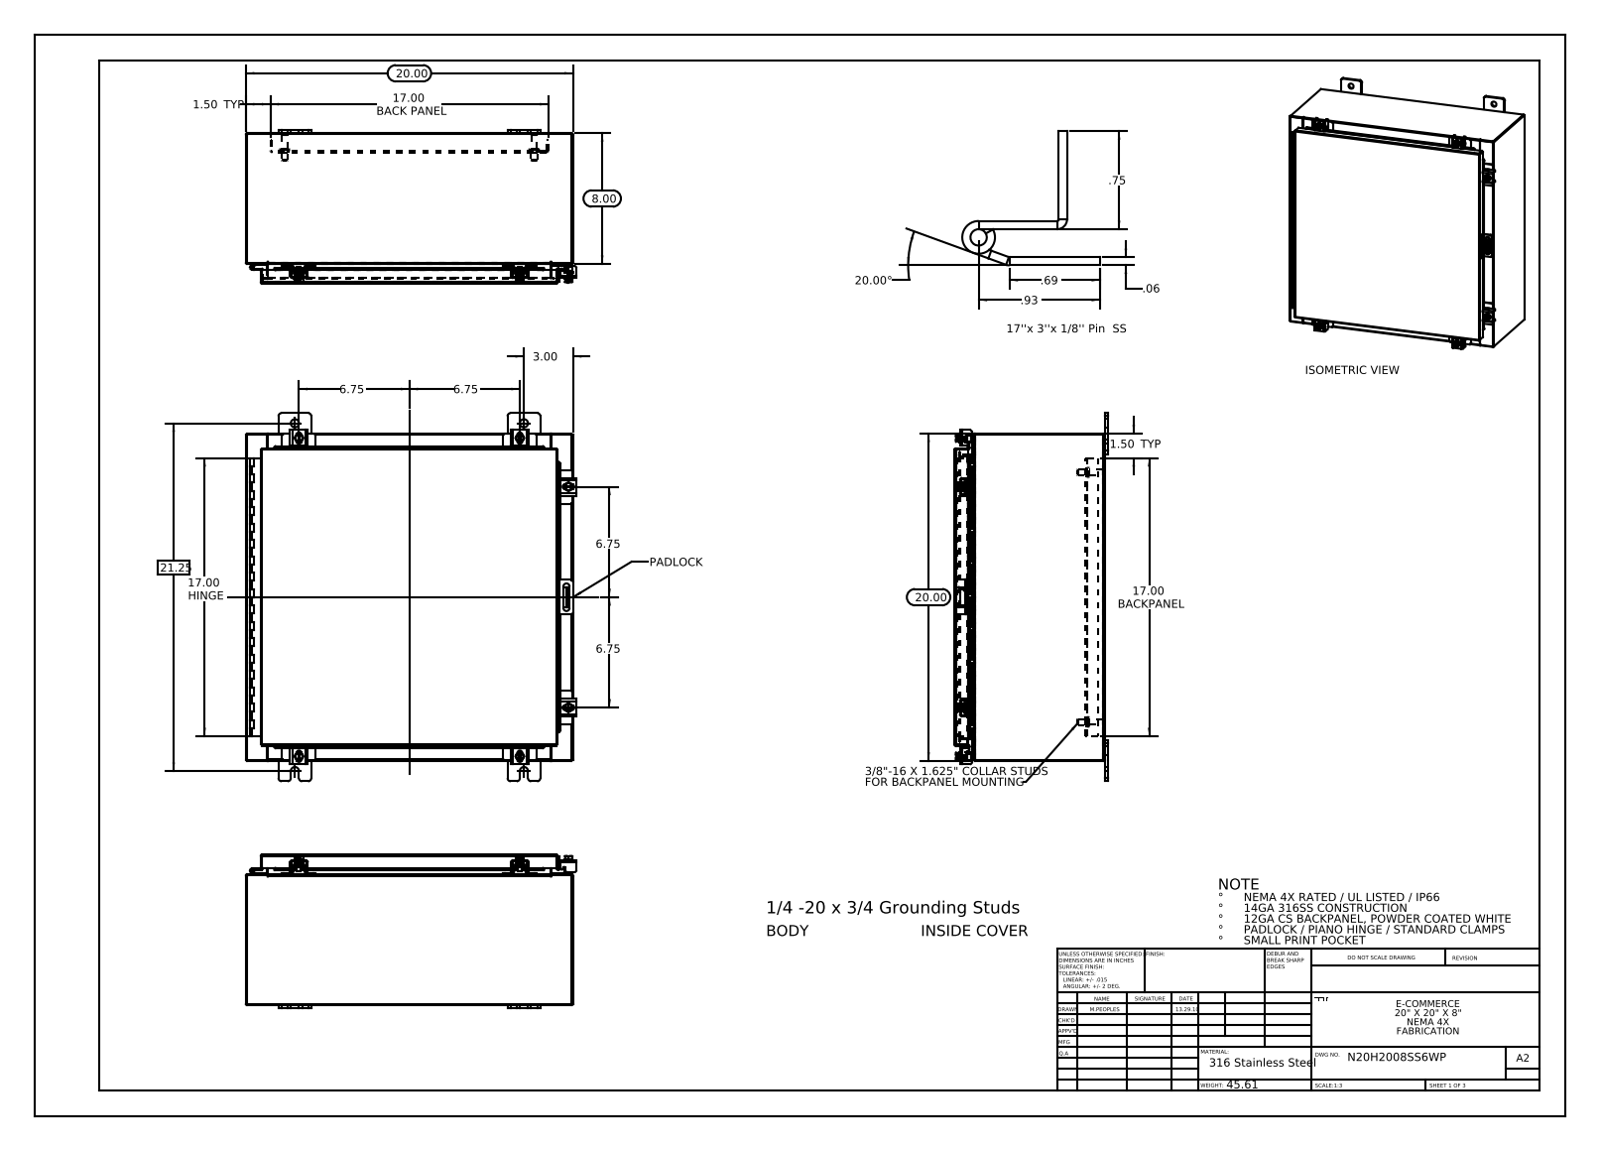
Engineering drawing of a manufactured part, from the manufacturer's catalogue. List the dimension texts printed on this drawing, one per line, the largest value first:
21.25
20.00
20.00
20.00°
17.00 HINGE
17.00 BACK PANEL
17.00 BACKPANEL
8.00
6.75
6.75
6.75
6.75
3.00
1.50 TYP
1.50 TYP
.93
.75
.69
.06
